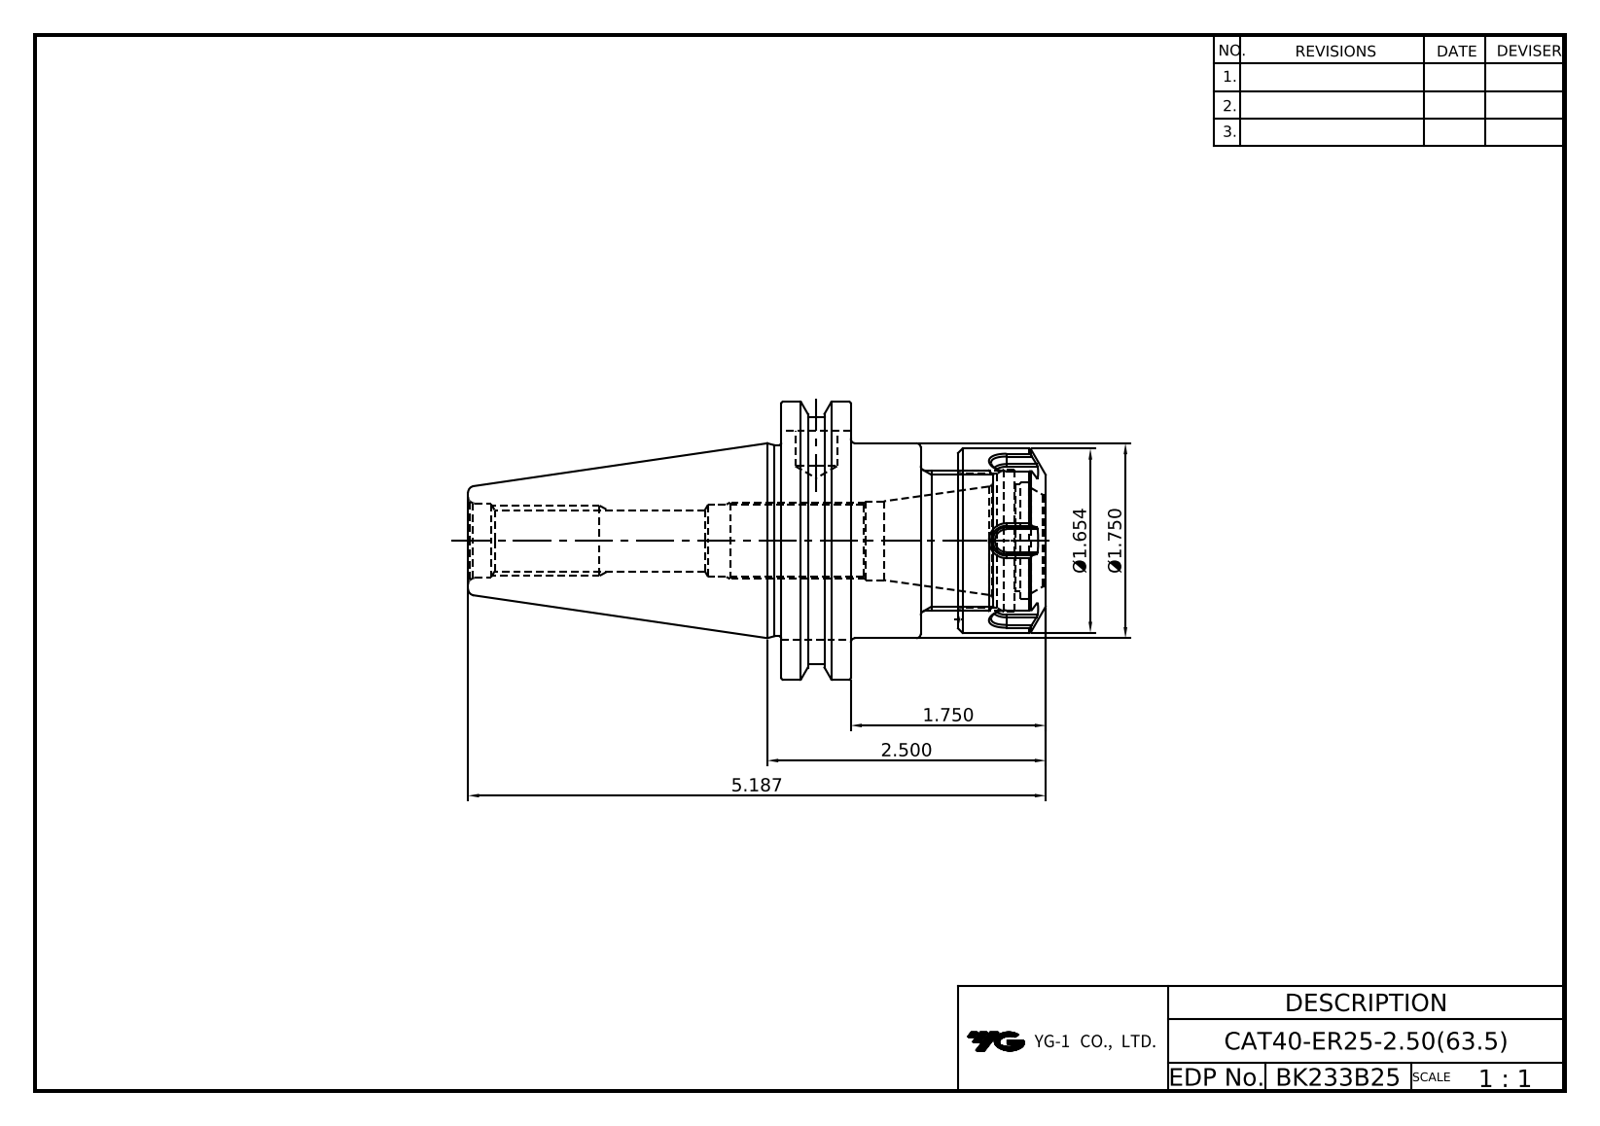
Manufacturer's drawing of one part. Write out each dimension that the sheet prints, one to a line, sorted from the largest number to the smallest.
5.187
2.500
Ø1.750
1.750
Ø1.654
